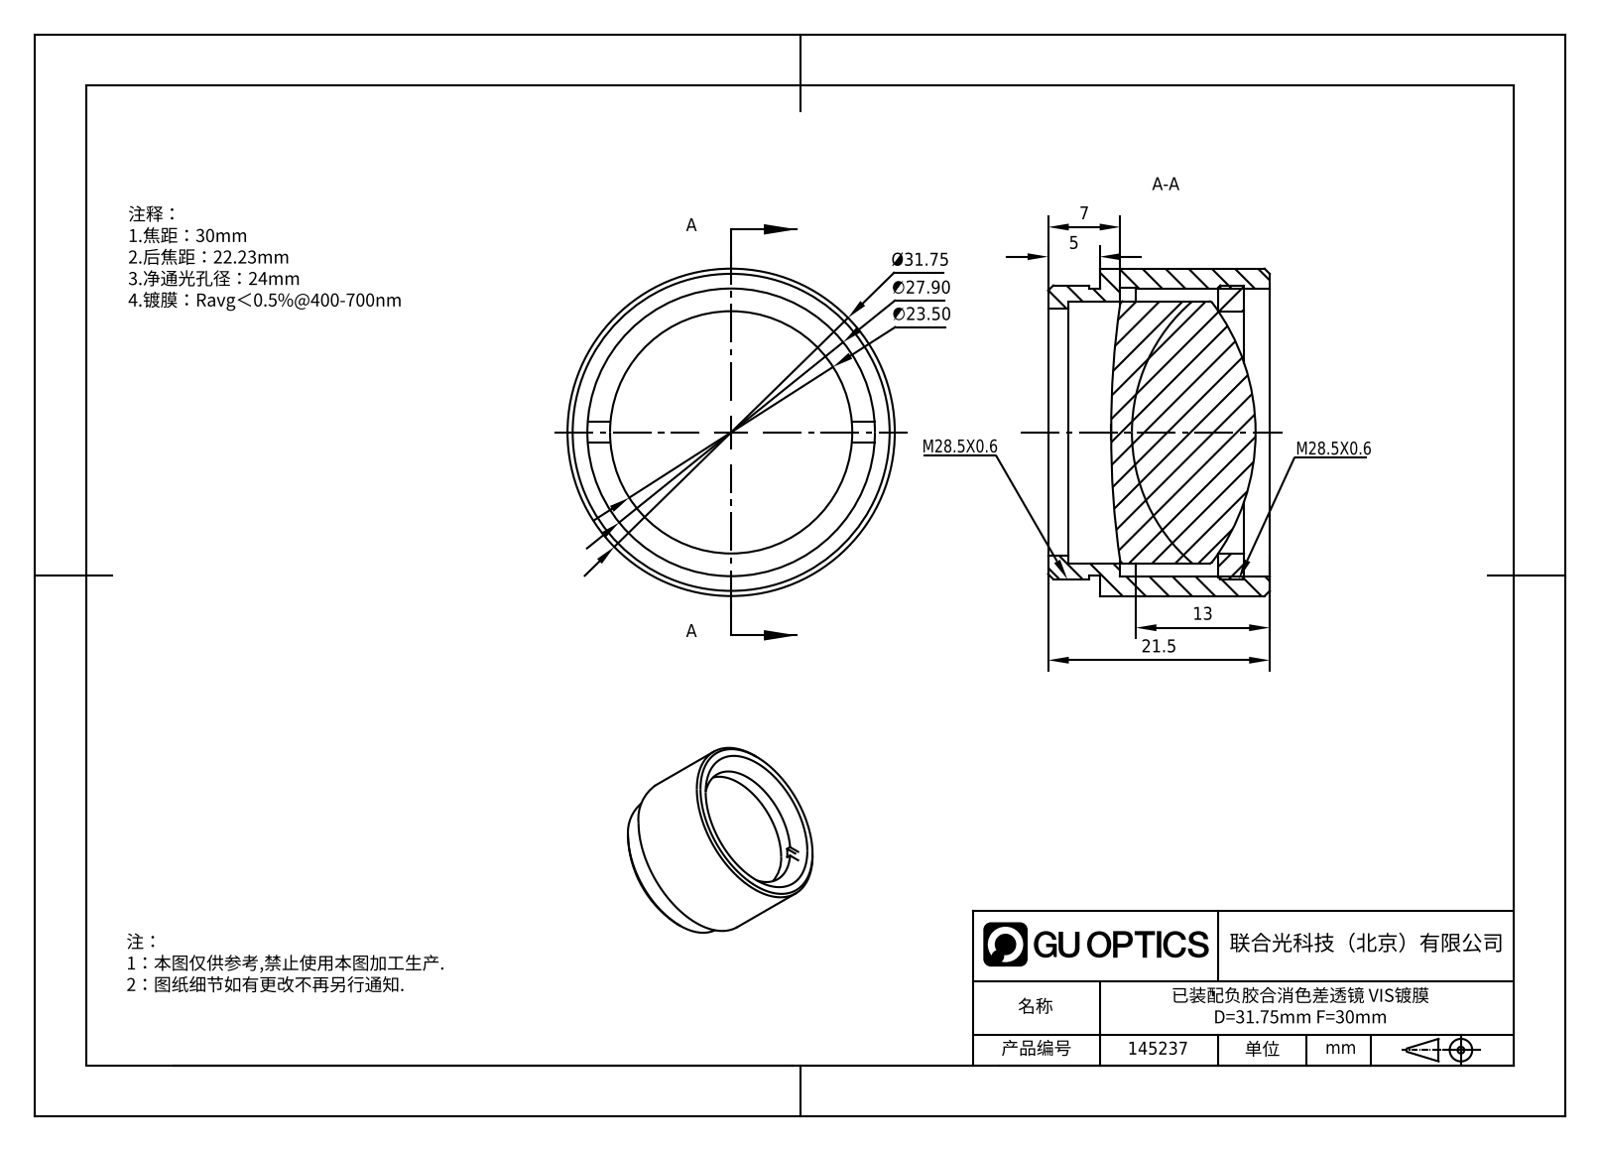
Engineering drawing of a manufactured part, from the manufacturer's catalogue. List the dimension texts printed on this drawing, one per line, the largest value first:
Ø31.75
∅27.90
∅23.50
21.5
13
7
5
